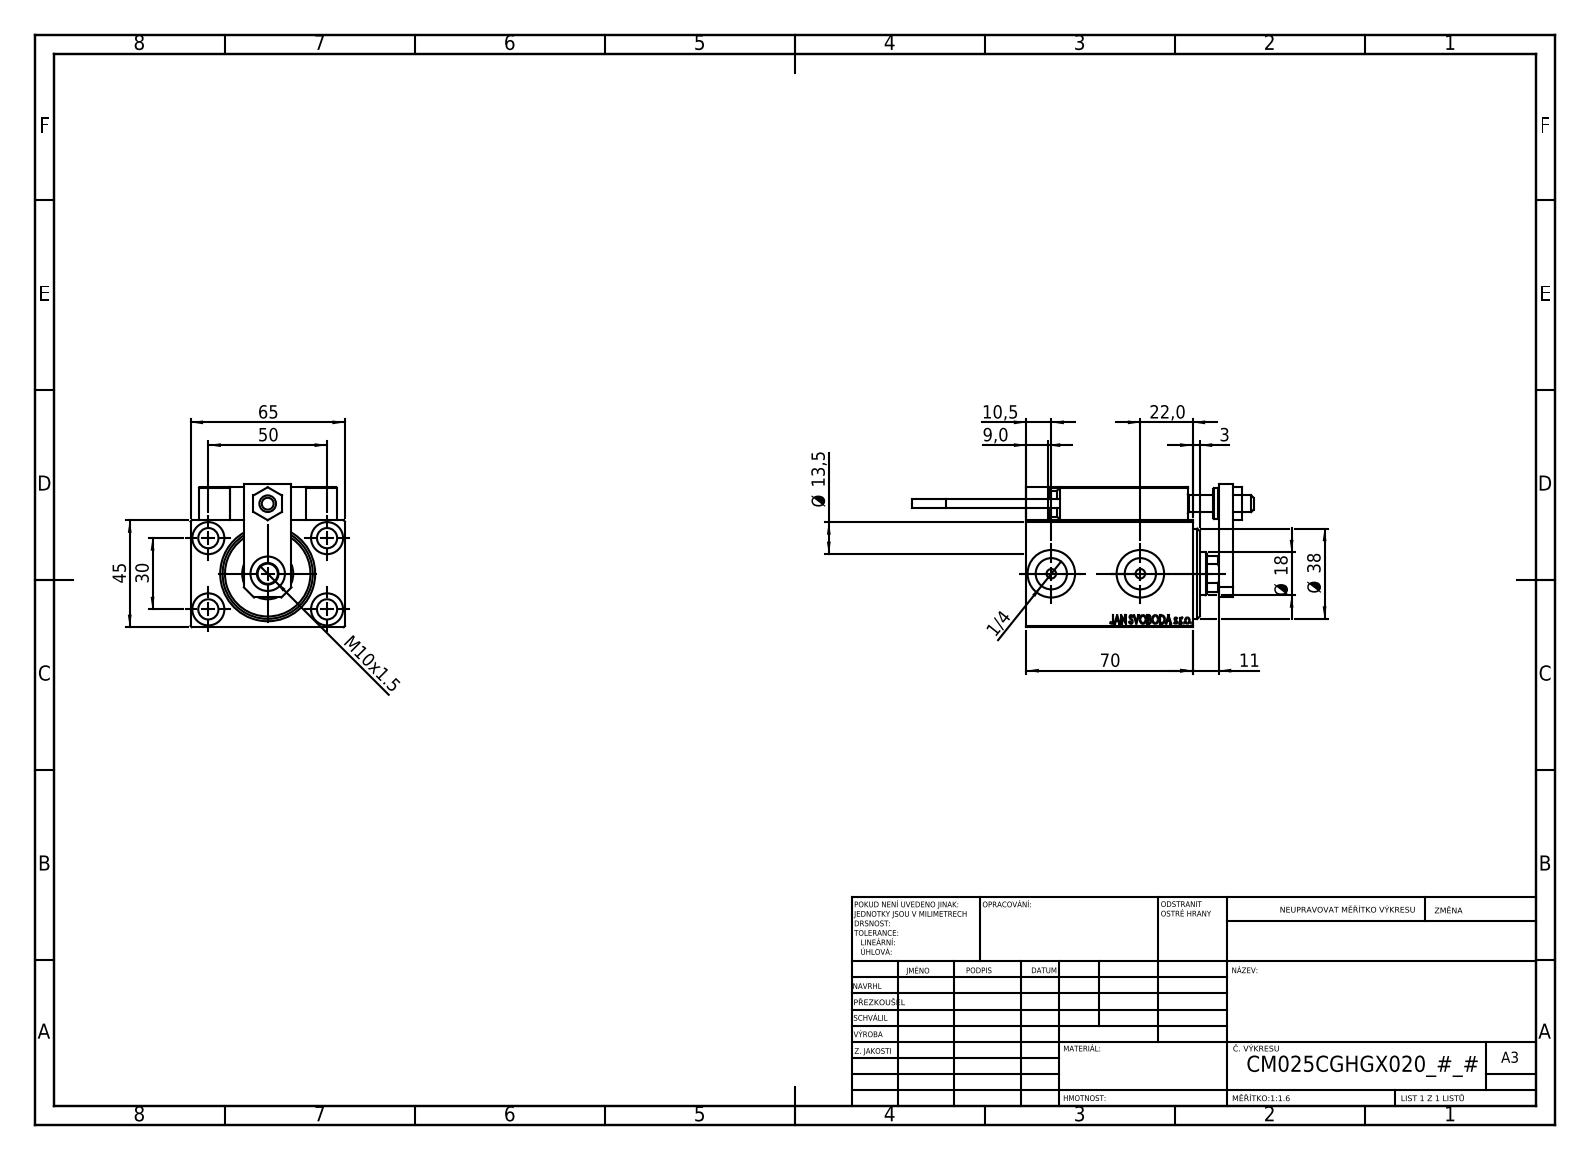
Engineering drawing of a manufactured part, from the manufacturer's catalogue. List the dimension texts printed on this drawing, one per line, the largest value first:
70
65
50
45
Ø 38
30
22,0
Ø 18
Ø 13,5
11
10,5
M10x1.5
9,0
3
1/4
